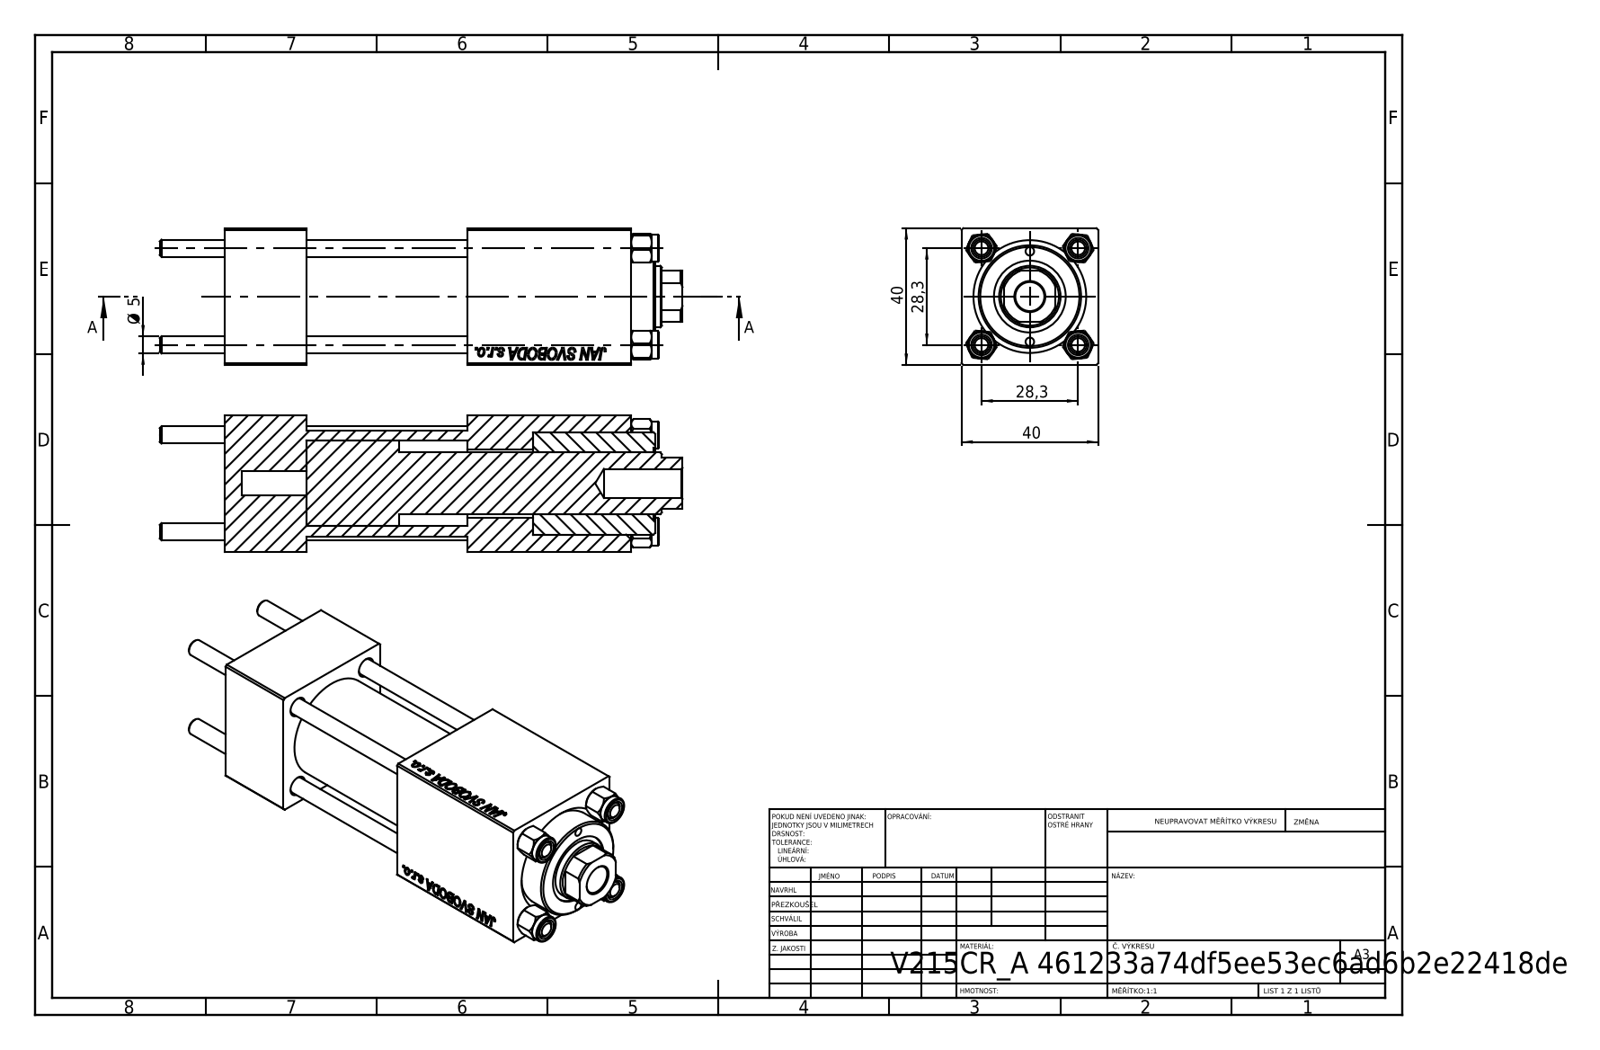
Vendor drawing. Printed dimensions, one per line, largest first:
40
40
28,3
28,3
Ø 5
